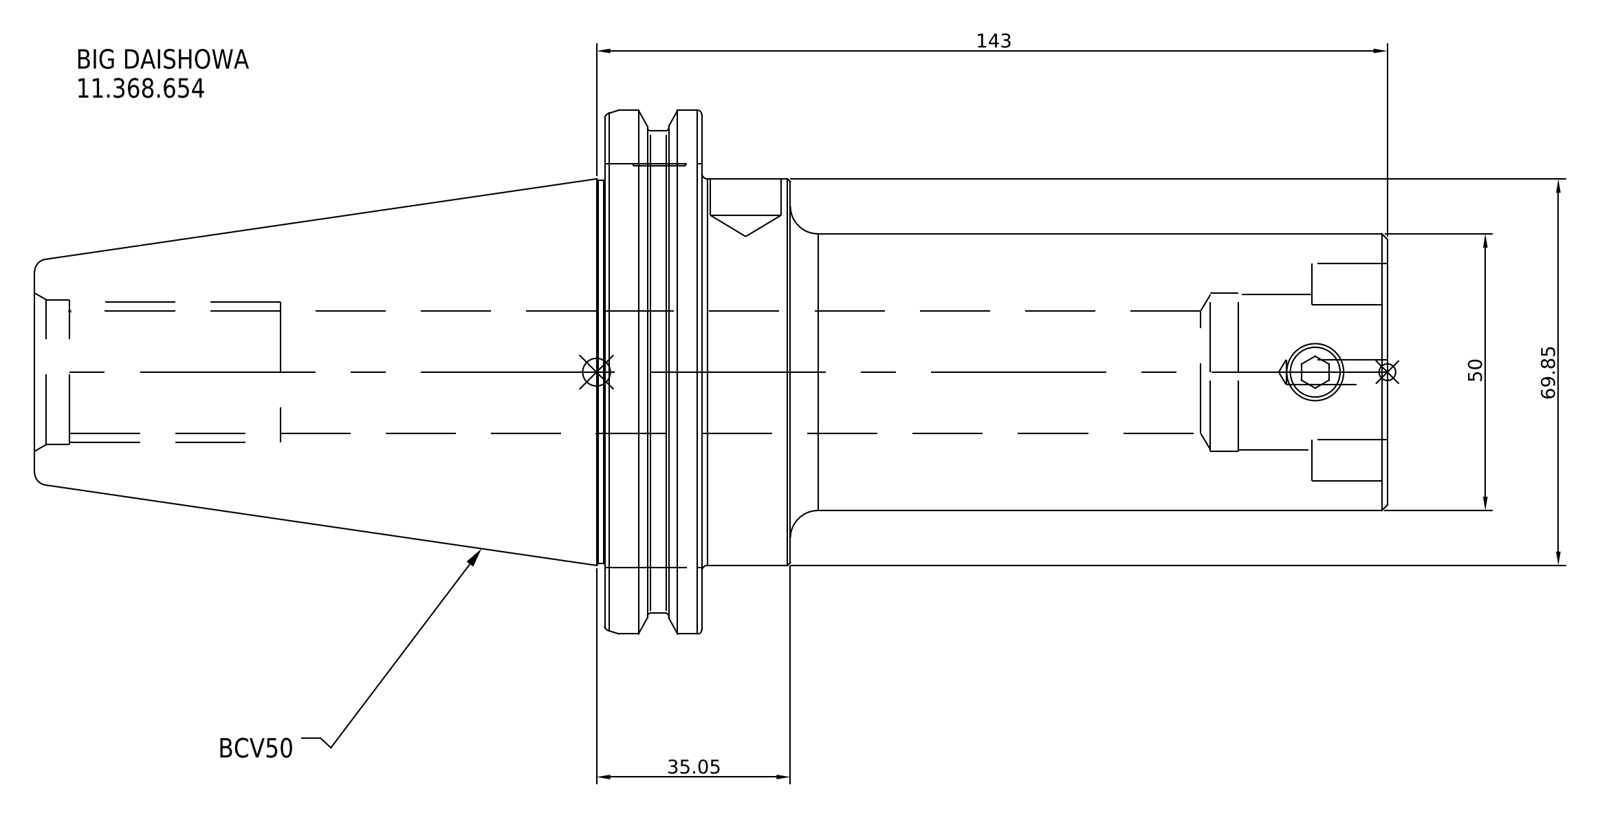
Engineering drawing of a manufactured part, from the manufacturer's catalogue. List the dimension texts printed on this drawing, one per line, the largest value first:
143
69.85
50
35.05
